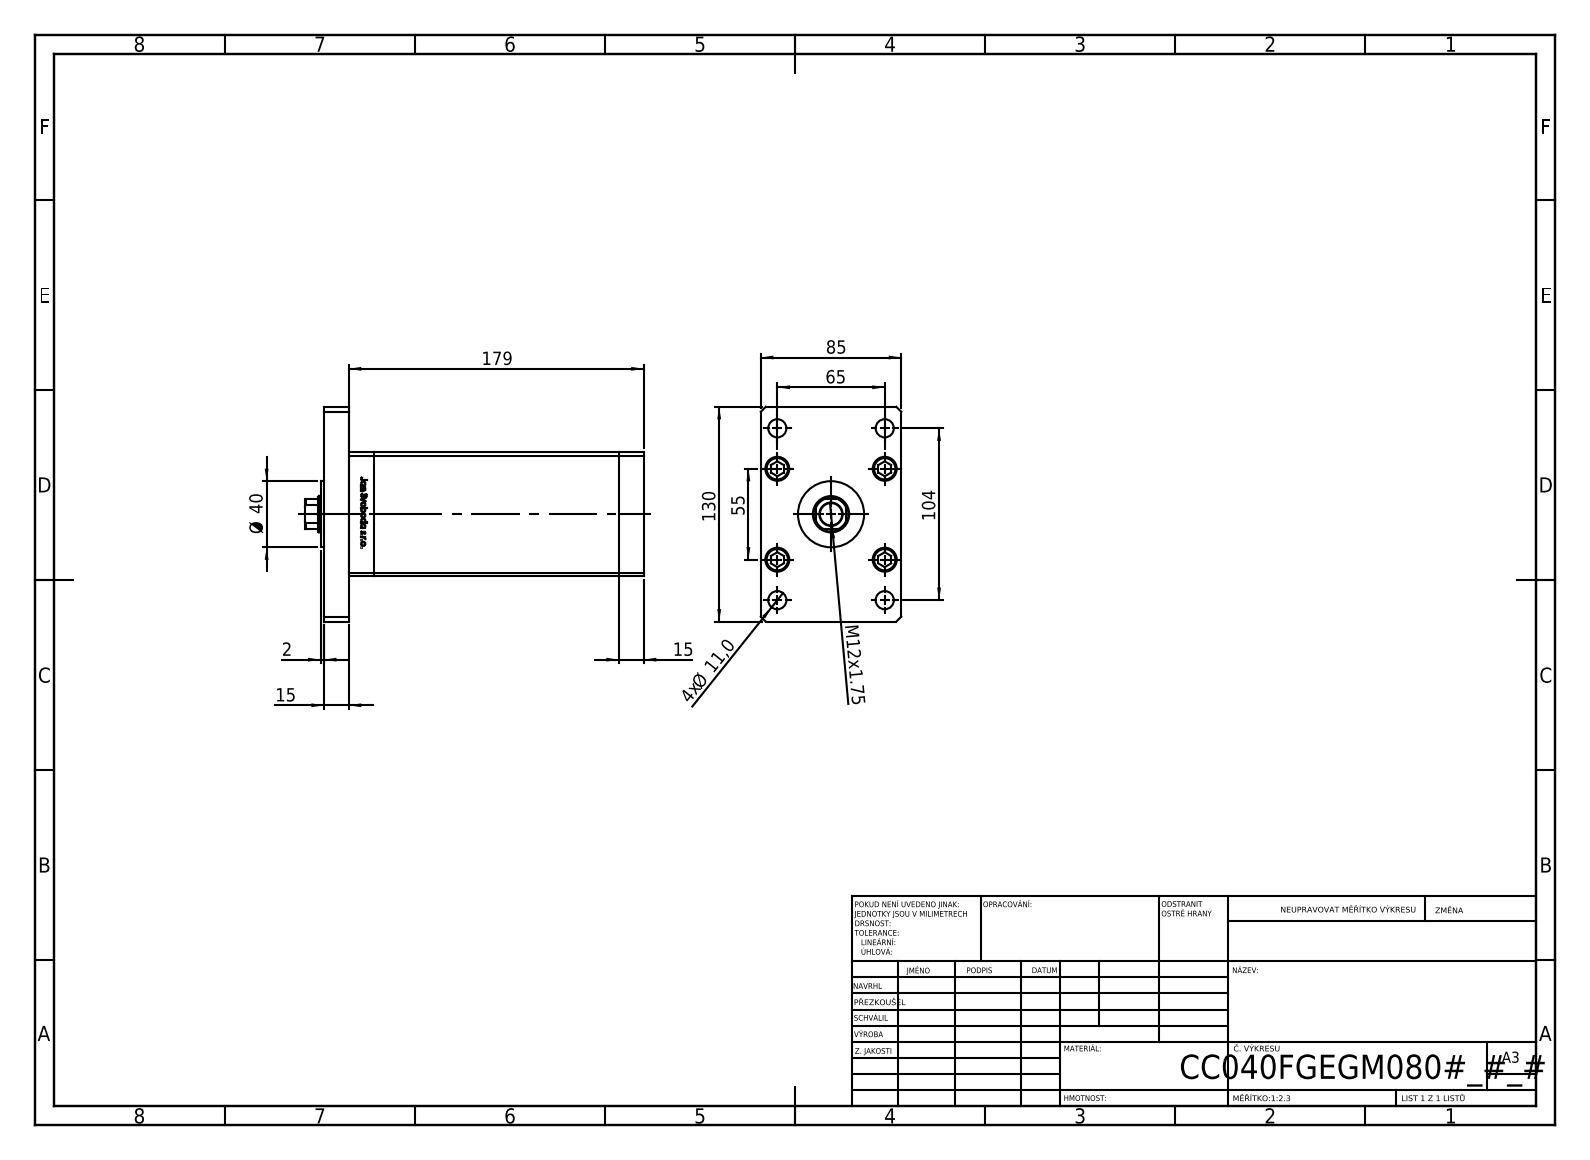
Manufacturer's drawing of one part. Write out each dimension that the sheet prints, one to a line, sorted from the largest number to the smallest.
179
130
104
85
65
55
Ø 40
15
15
M12x1.75
4x Ø 11,0
2
